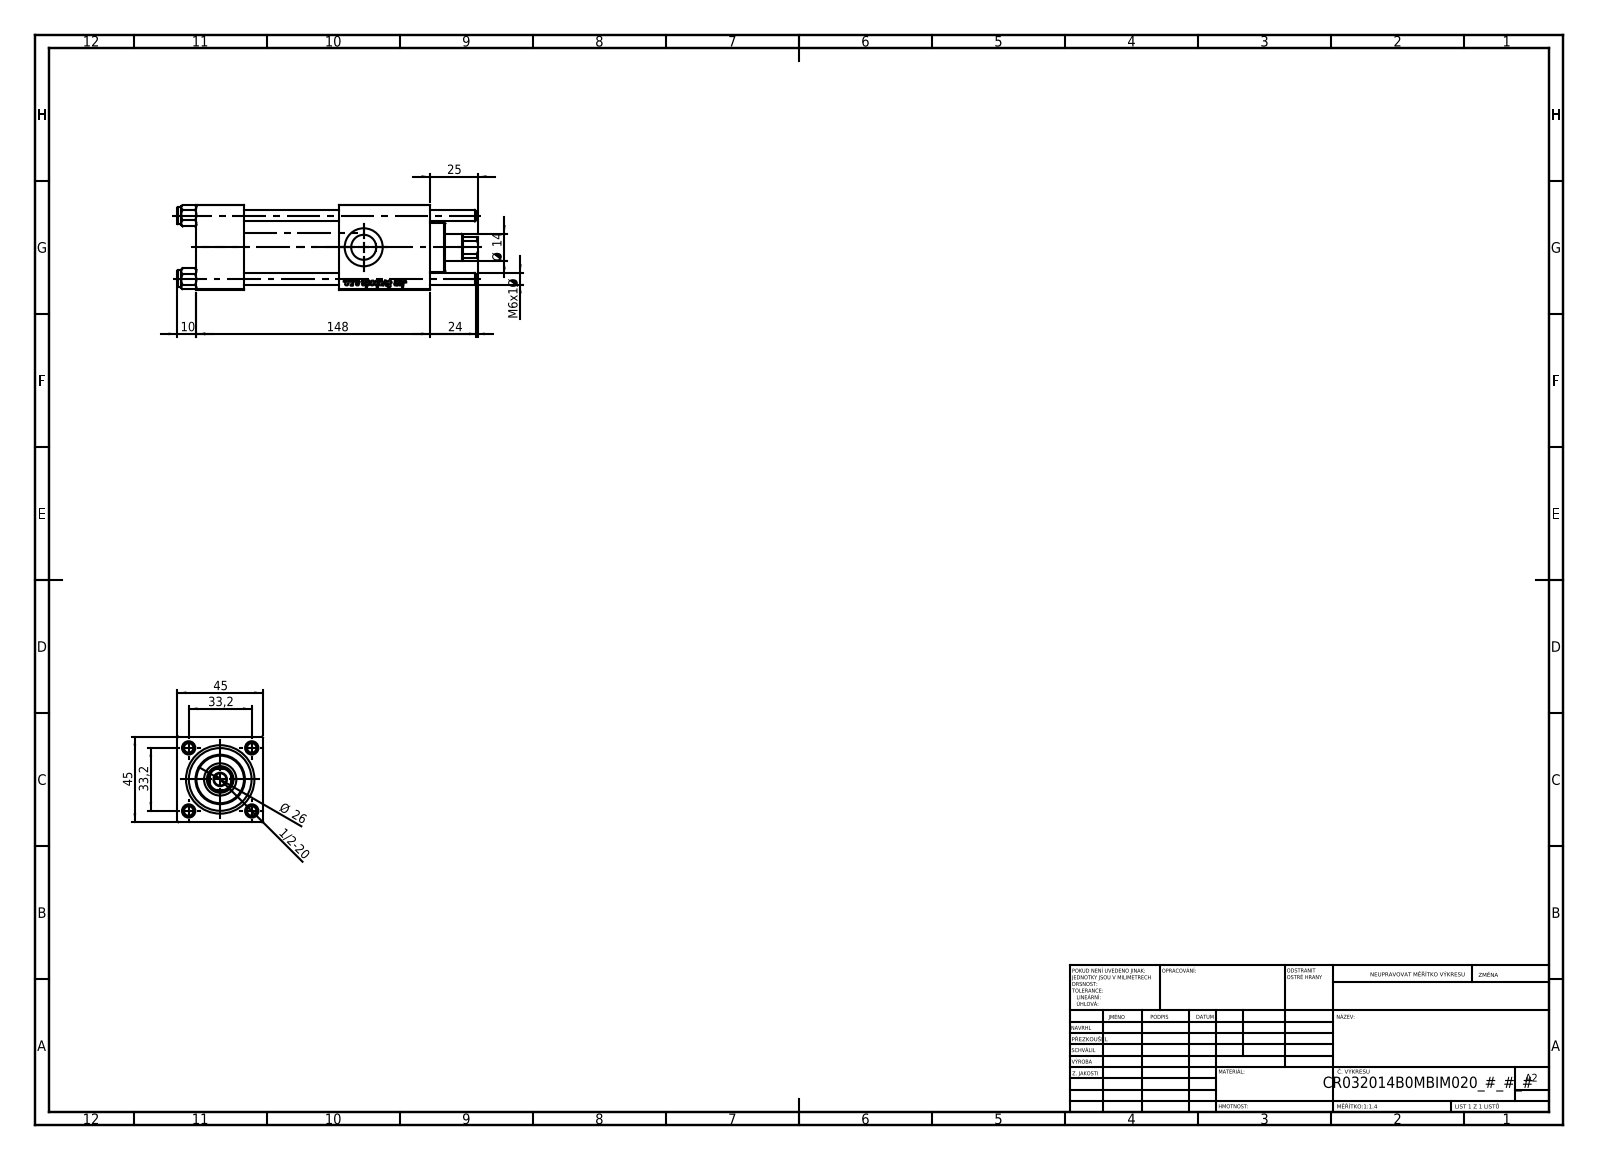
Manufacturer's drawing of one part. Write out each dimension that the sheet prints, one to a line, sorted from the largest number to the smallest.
148
45
45
33,2
33,2
Ø 26
25
24
Ø 14
10
M6x1 Ø
1/2-20
